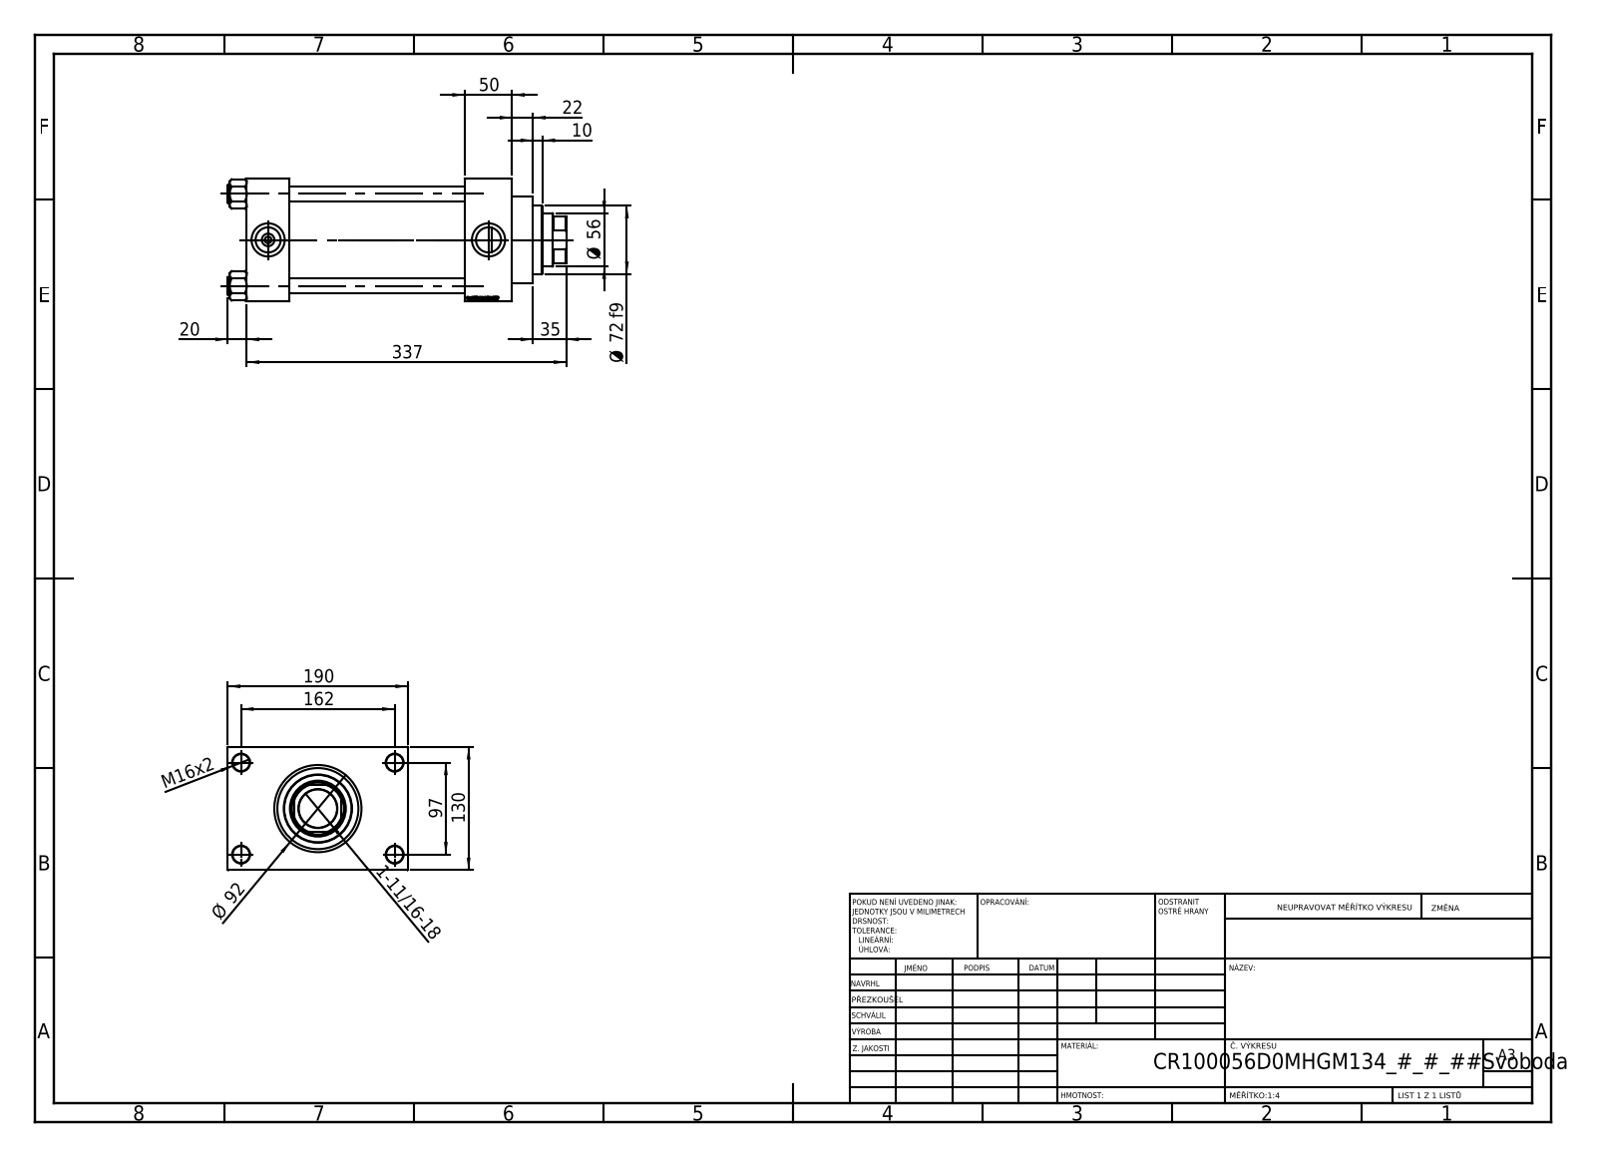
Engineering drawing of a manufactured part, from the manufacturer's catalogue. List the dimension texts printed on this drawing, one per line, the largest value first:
337
190
162
130
97
Ø 92
Ø 72 f9
Ø 56
50
35
22
20
M16x2
10
1-11/16-18
